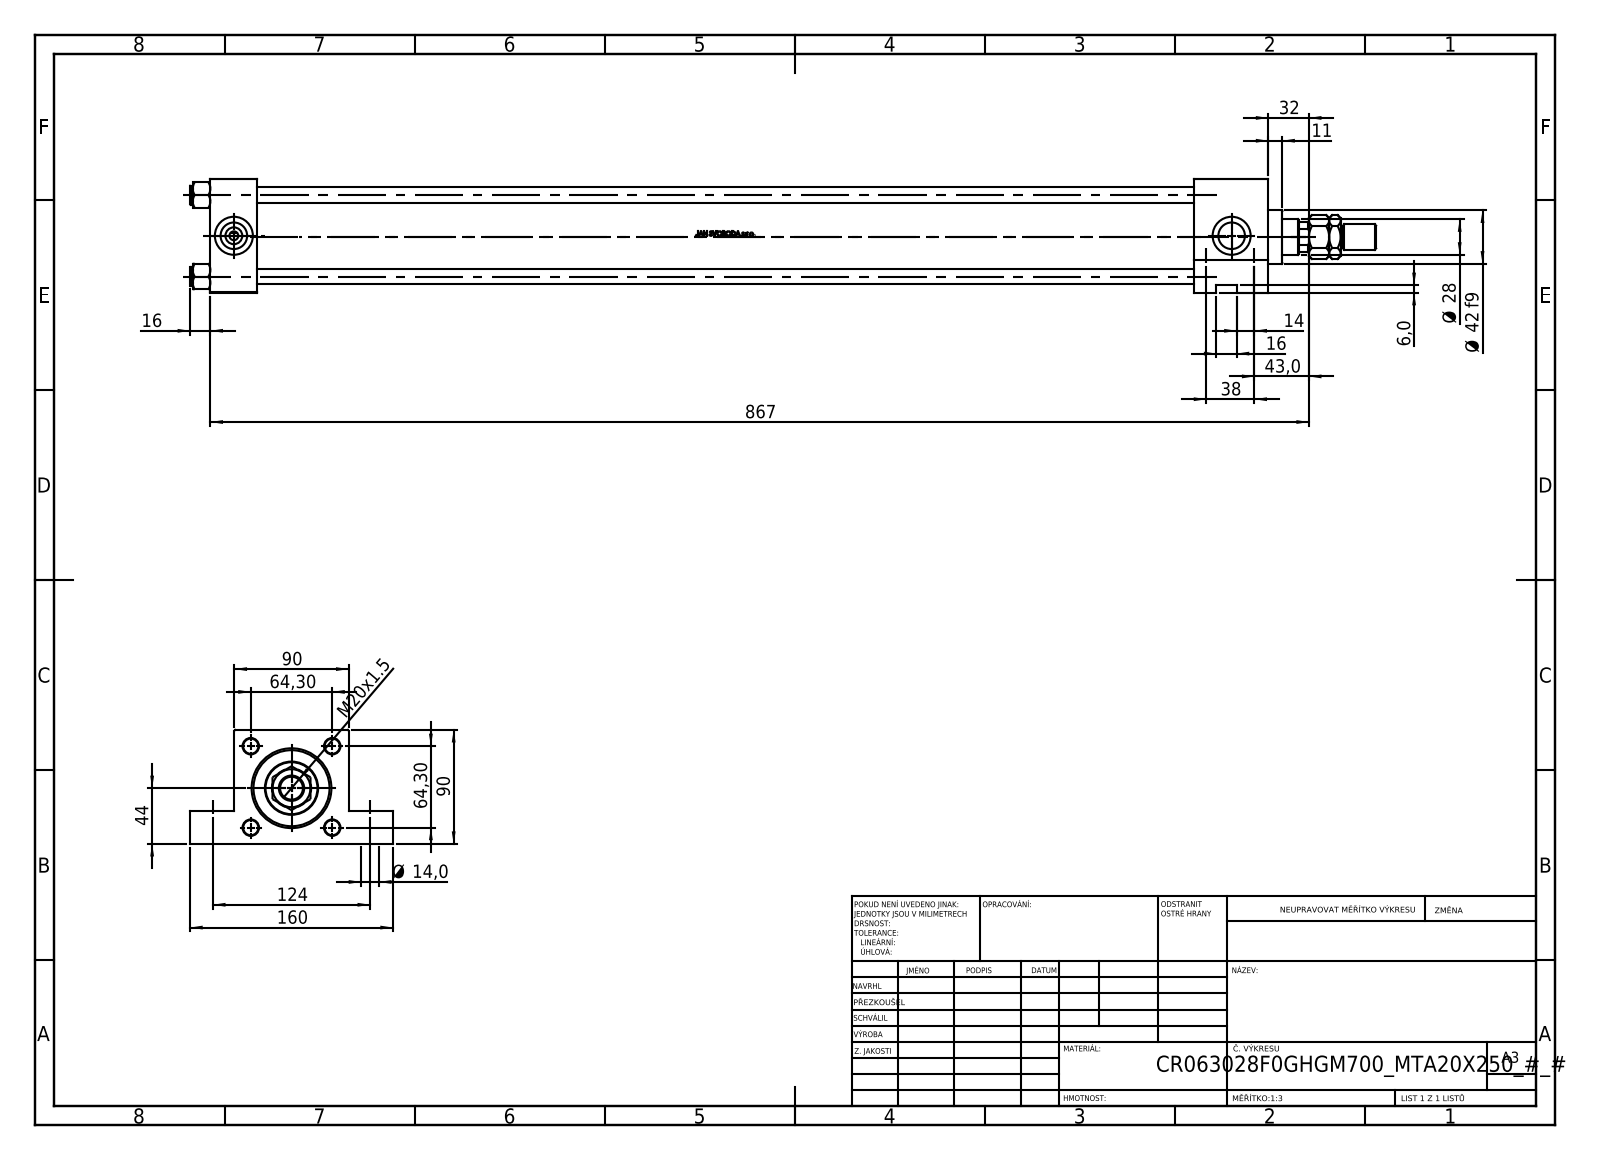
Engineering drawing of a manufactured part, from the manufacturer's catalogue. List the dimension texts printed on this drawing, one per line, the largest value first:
867
160
124
90
90
64,30
64,30
44
43,0
Ø 42 f9
38
32
Ø 28
M20x1.5
16
16
14
Ø 14,0
11
6,0
